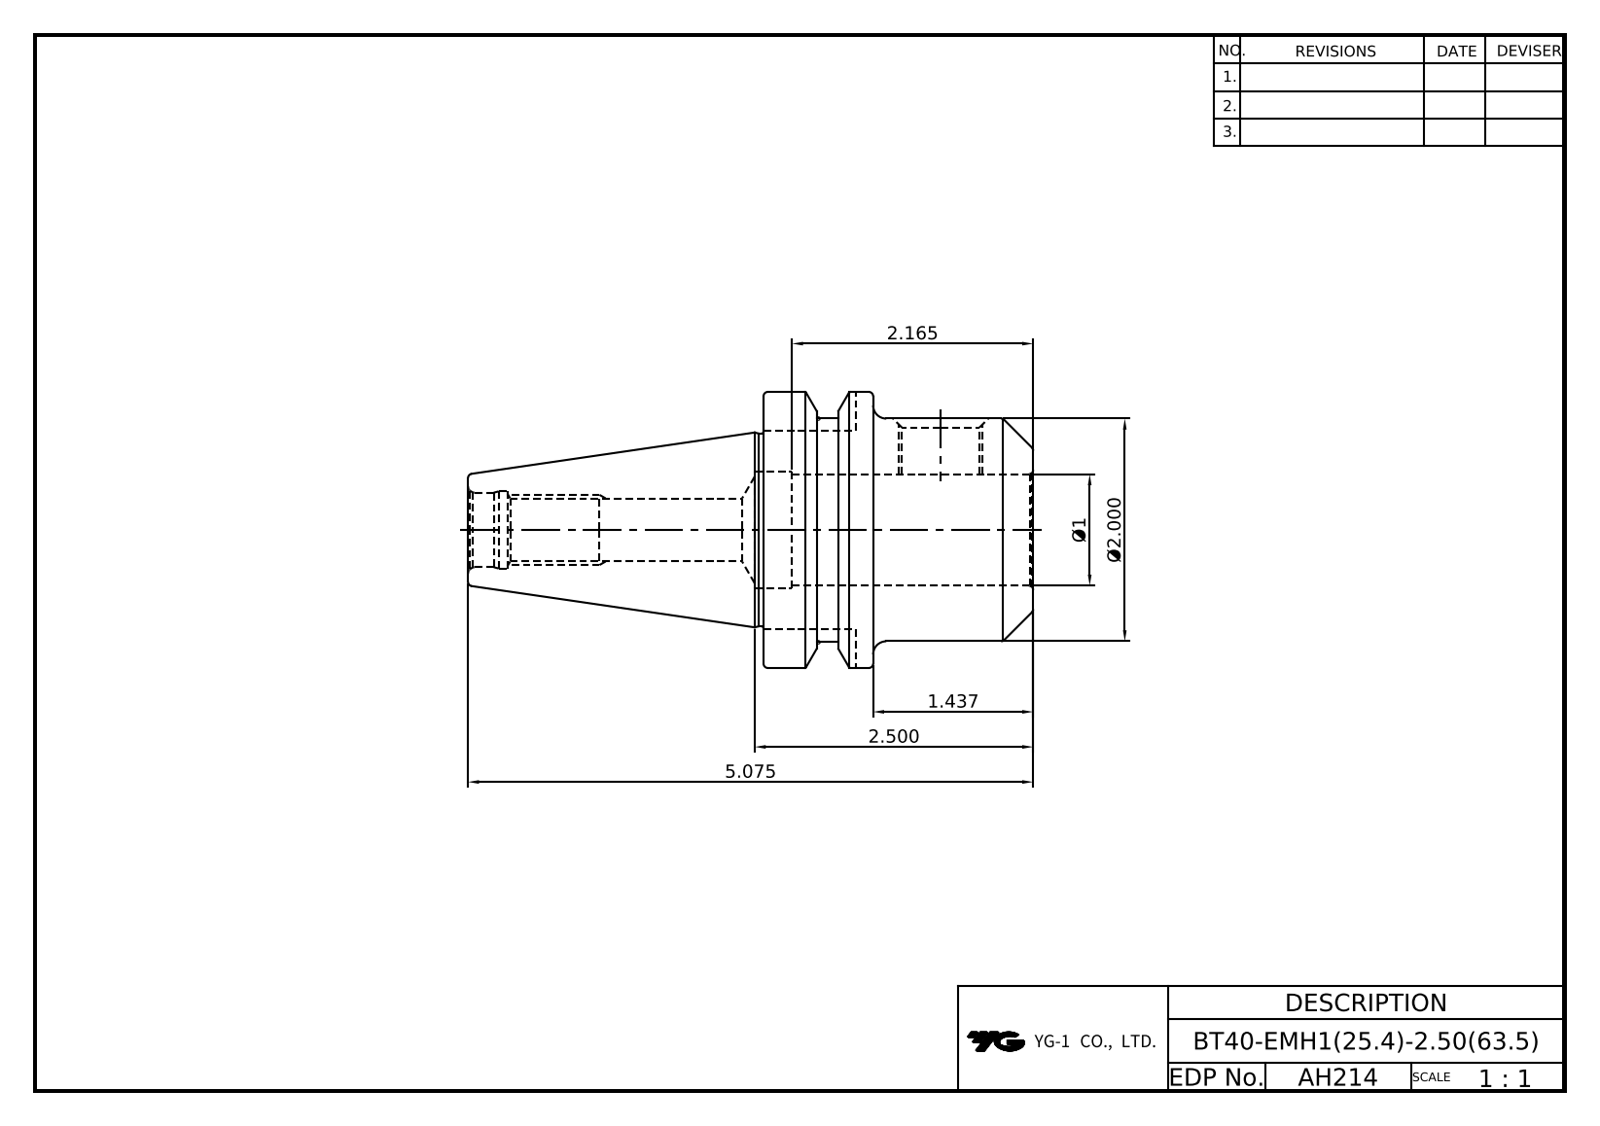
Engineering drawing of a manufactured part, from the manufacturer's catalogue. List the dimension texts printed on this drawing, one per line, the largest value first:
5.075
2.500
2.165
Ø2.000
1.437
Ø1
